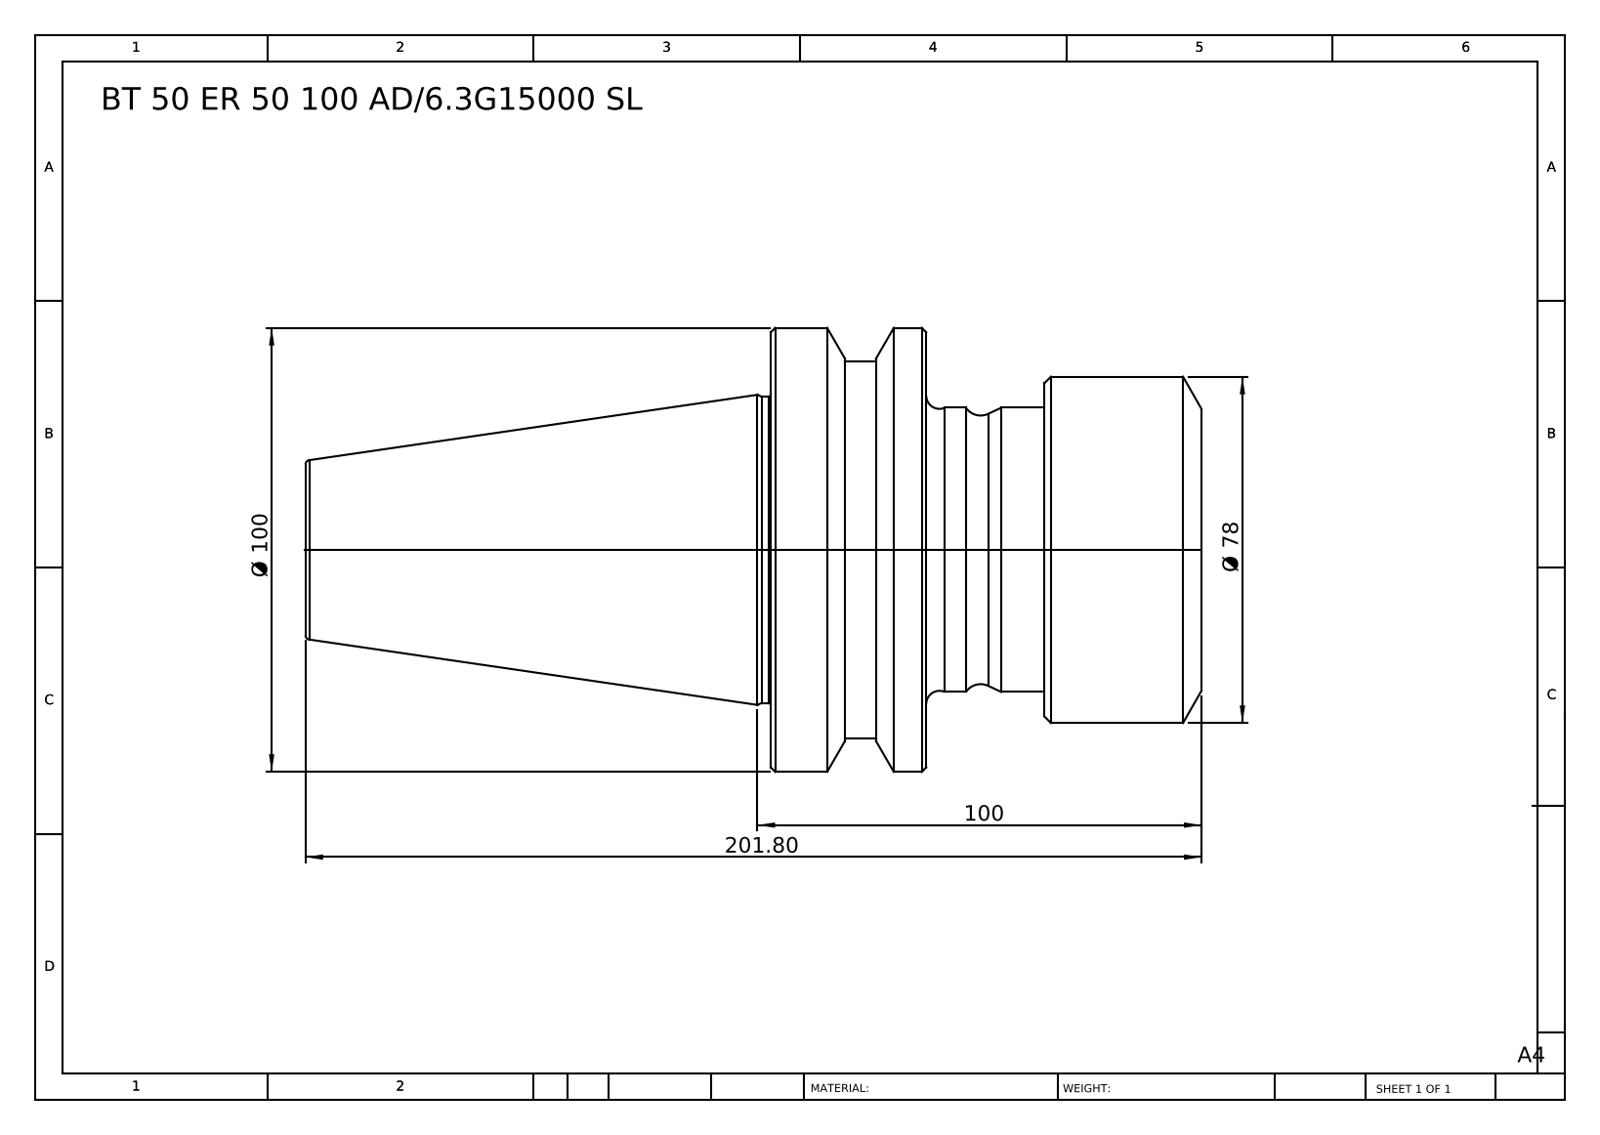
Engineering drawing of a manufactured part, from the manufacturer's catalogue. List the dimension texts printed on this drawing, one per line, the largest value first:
201.80
100
Ø 100
Ø 78
